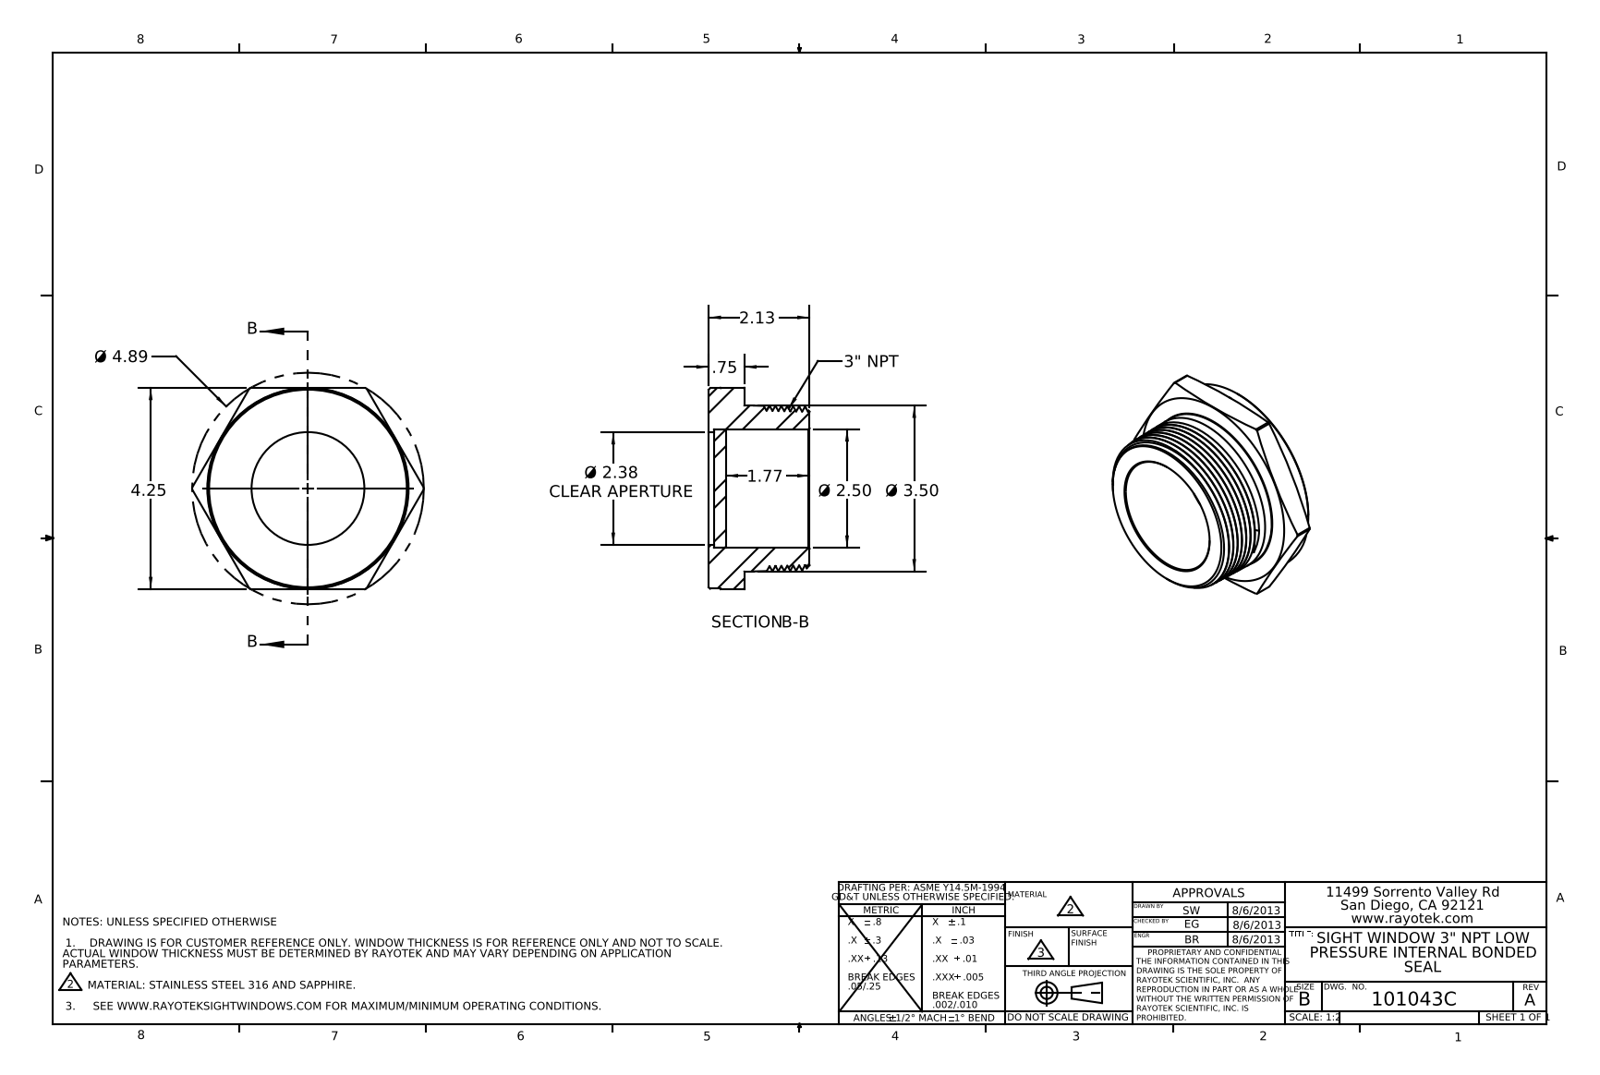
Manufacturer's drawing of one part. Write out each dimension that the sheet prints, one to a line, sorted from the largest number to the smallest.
Ø 4.89
4.25
Ø 3.50
Ø 2.50
Ø 2.38 CLEAR APERTURE
2.13
1.77
.75
